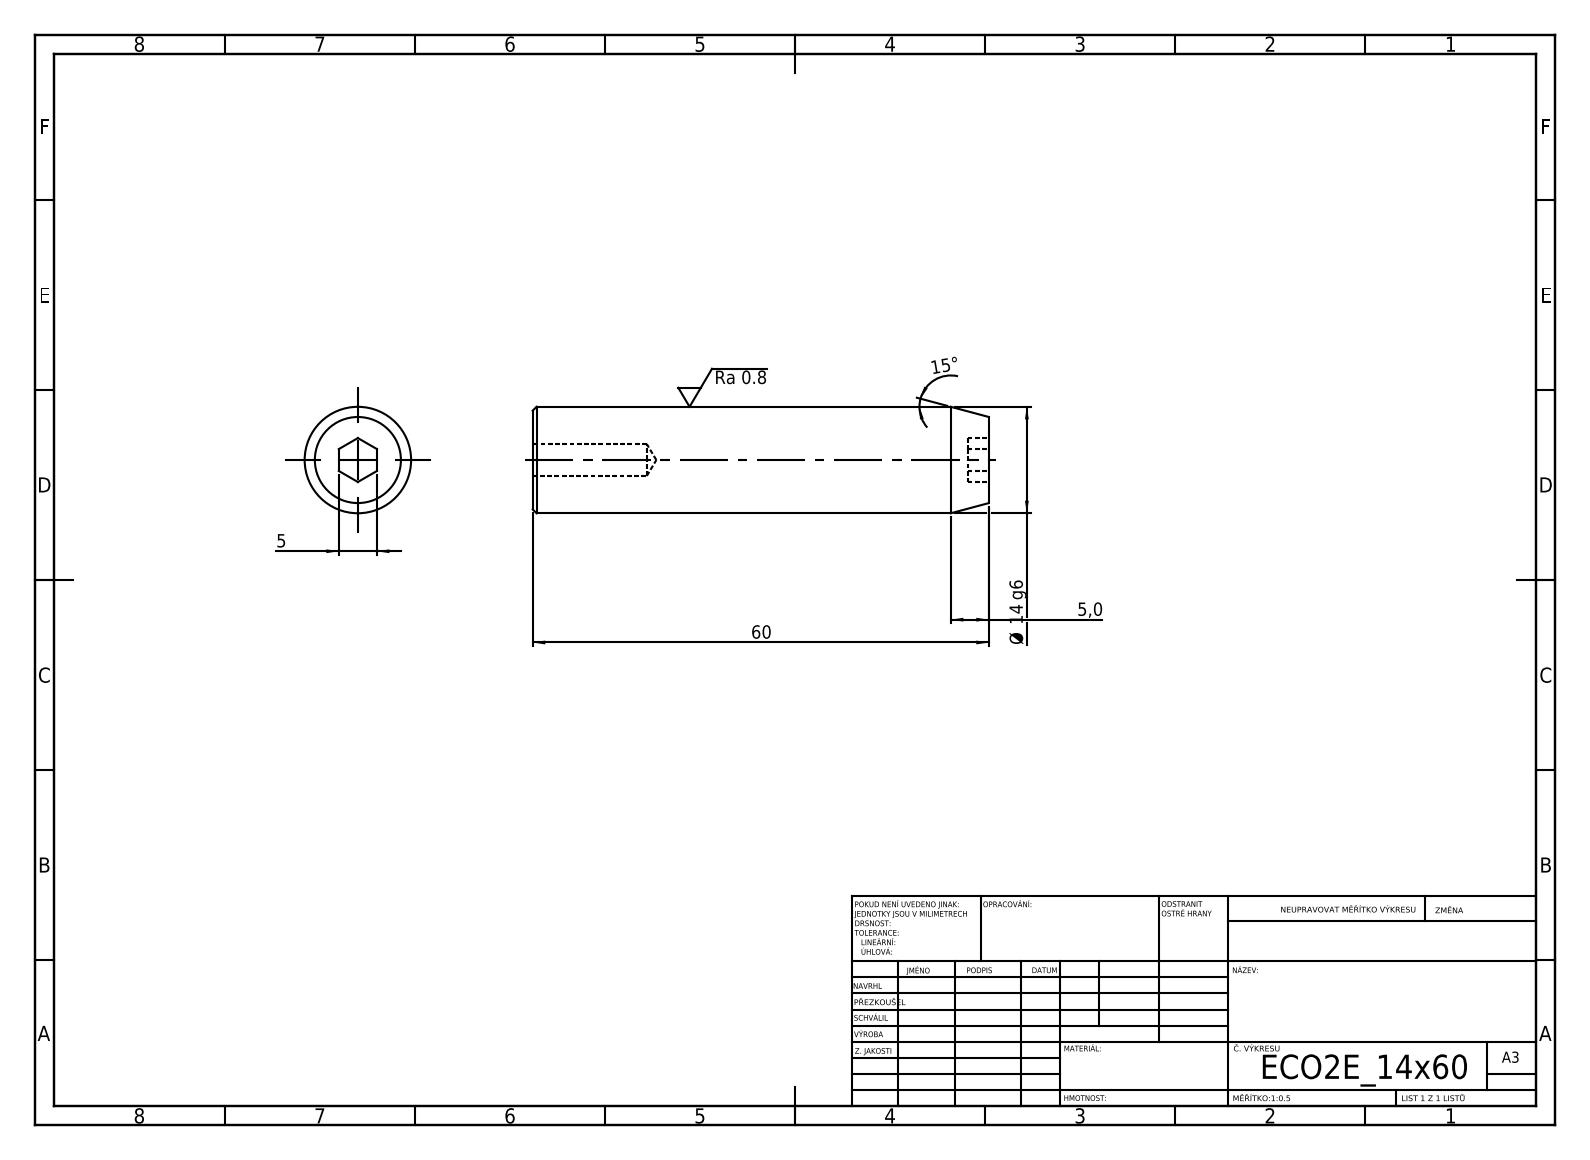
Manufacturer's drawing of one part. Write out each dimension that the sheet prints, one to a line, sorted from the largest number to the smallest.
60
15°
Ø 14 g6
5,0
5
